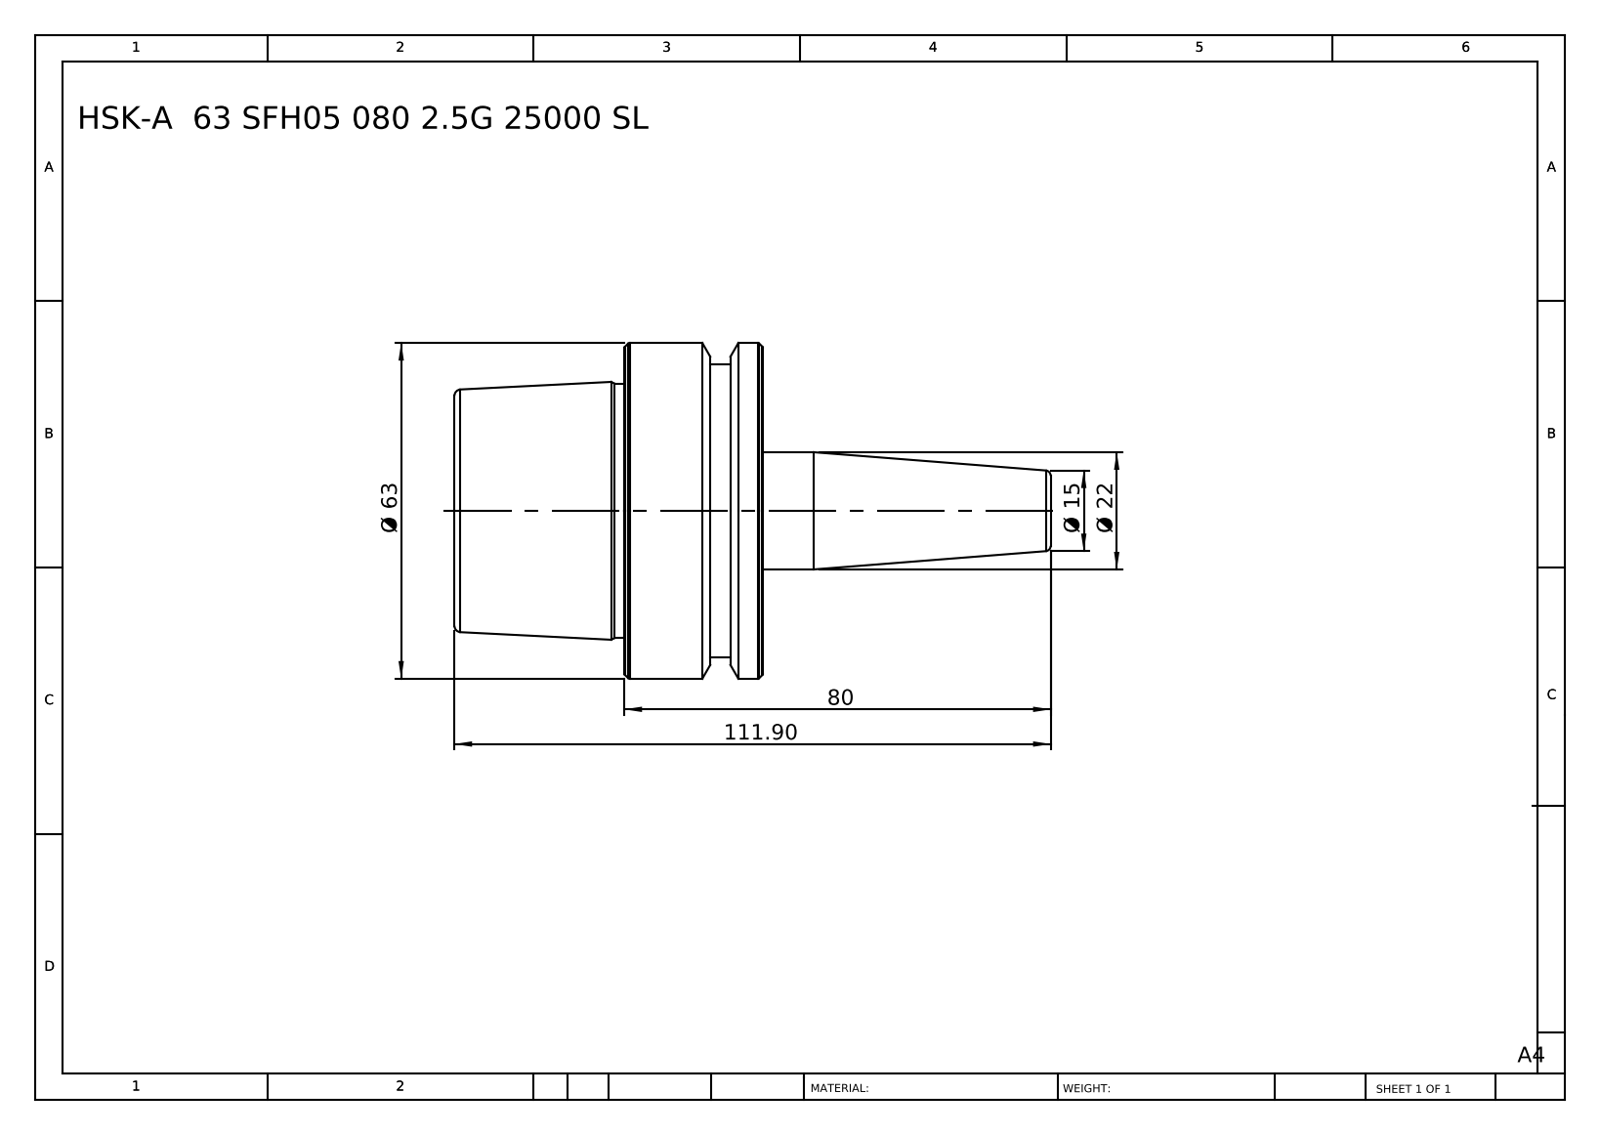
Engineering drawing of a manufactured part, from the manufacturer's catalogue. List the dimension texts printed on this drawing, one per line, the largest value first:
111.90
80
Ø 63
Ø 22
Ø 15
